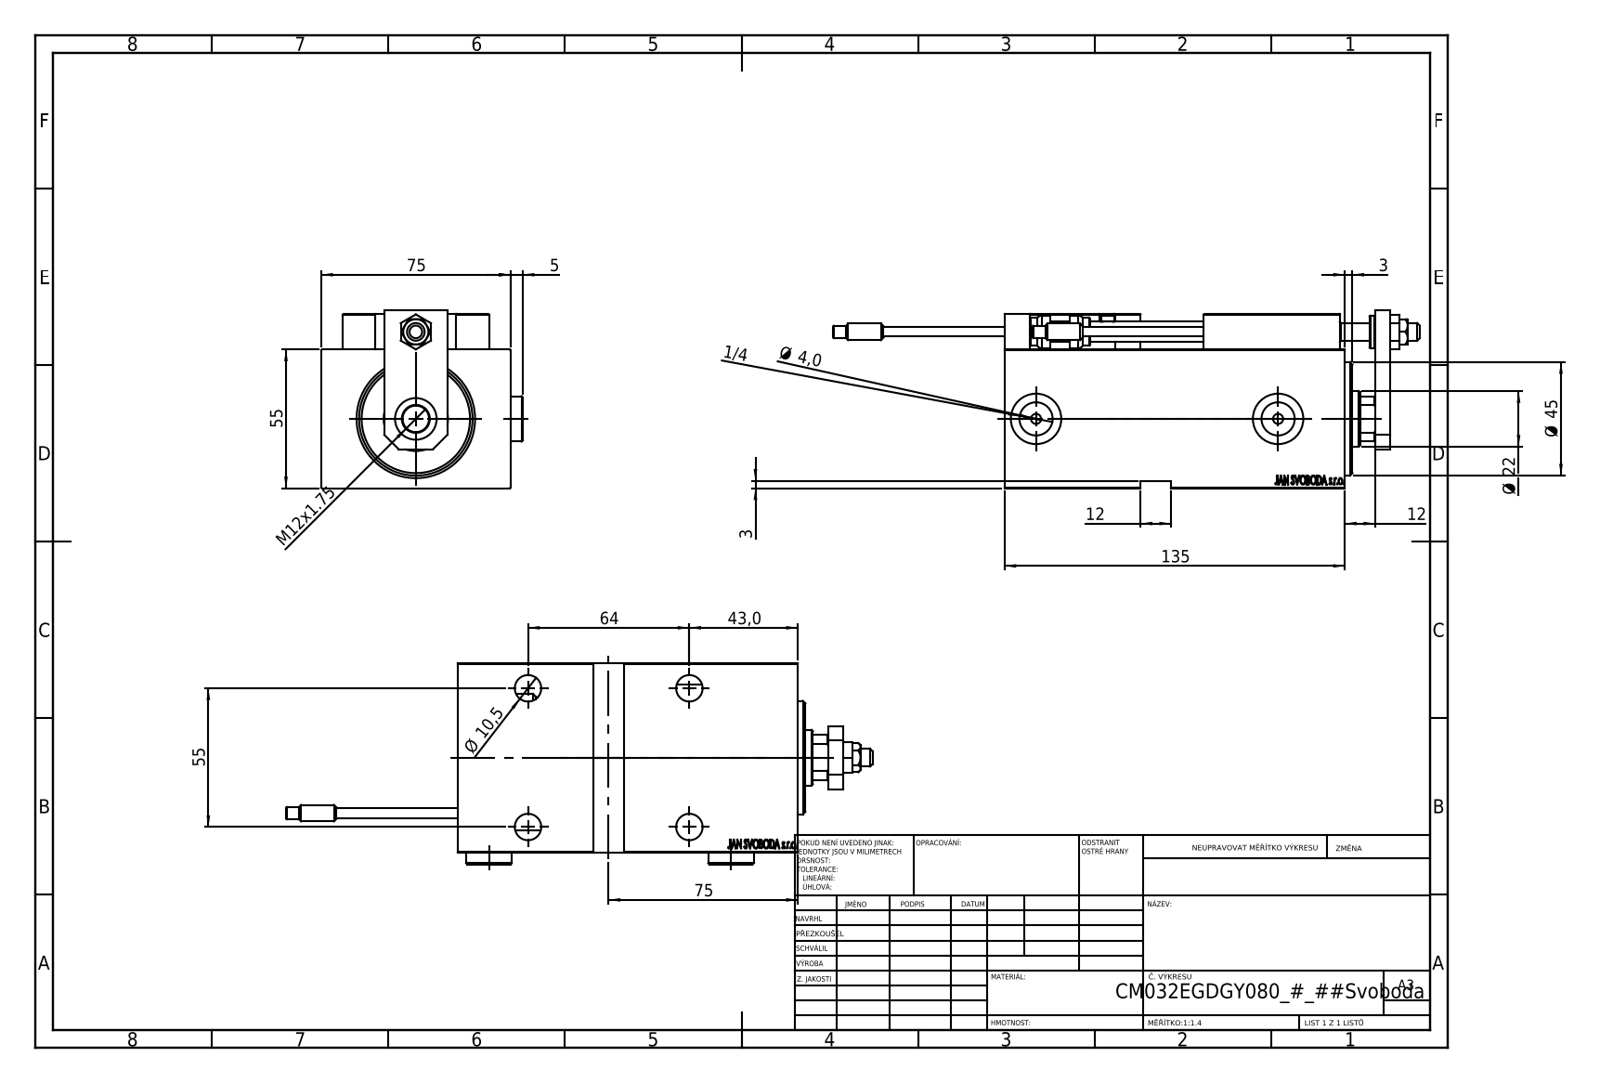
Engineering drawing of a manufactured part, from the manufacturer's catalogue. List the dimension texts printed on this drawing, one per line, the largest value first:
135
75
75
64
55
55
Ø 45
43,0
Ø 22
M12x1.75
12
12
Ø 10,5
5
Ø 4,0
3
3
1/4
